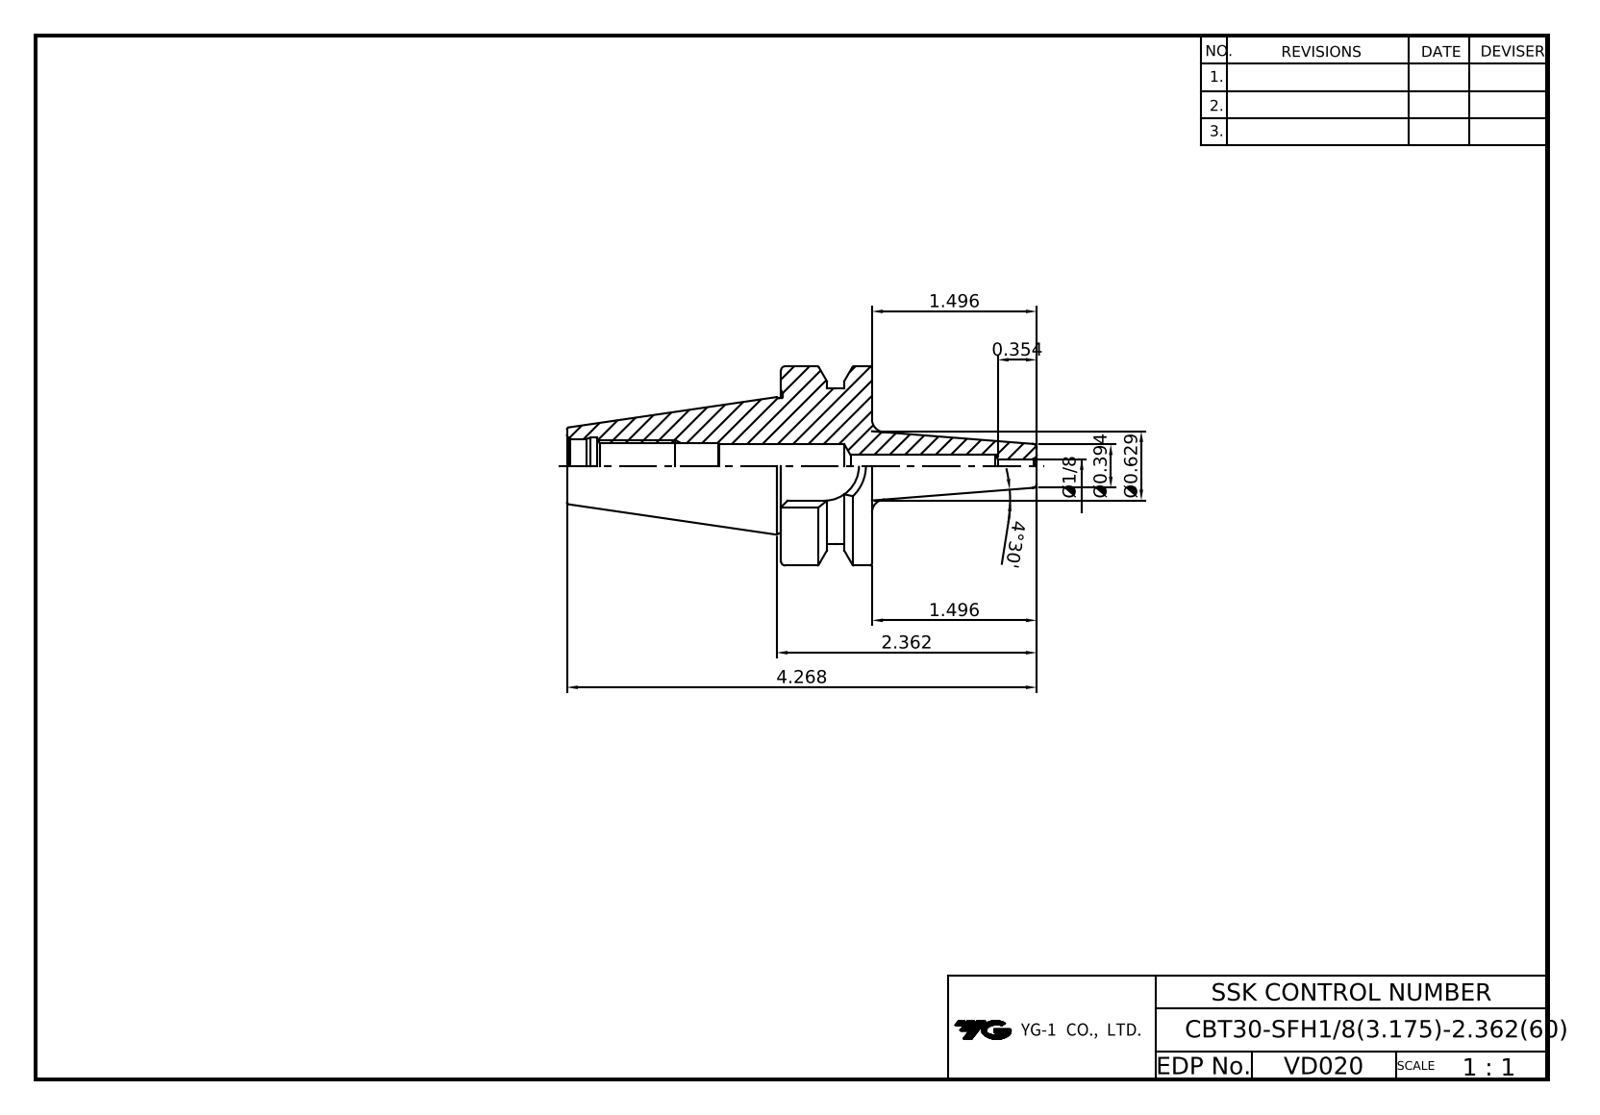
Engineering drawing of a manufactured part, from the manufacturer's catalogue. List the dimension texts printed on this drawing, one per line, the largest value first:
4.268
4°30'
2.362
1.496
1.496
Ø0.629
Ø0.394
0.354
